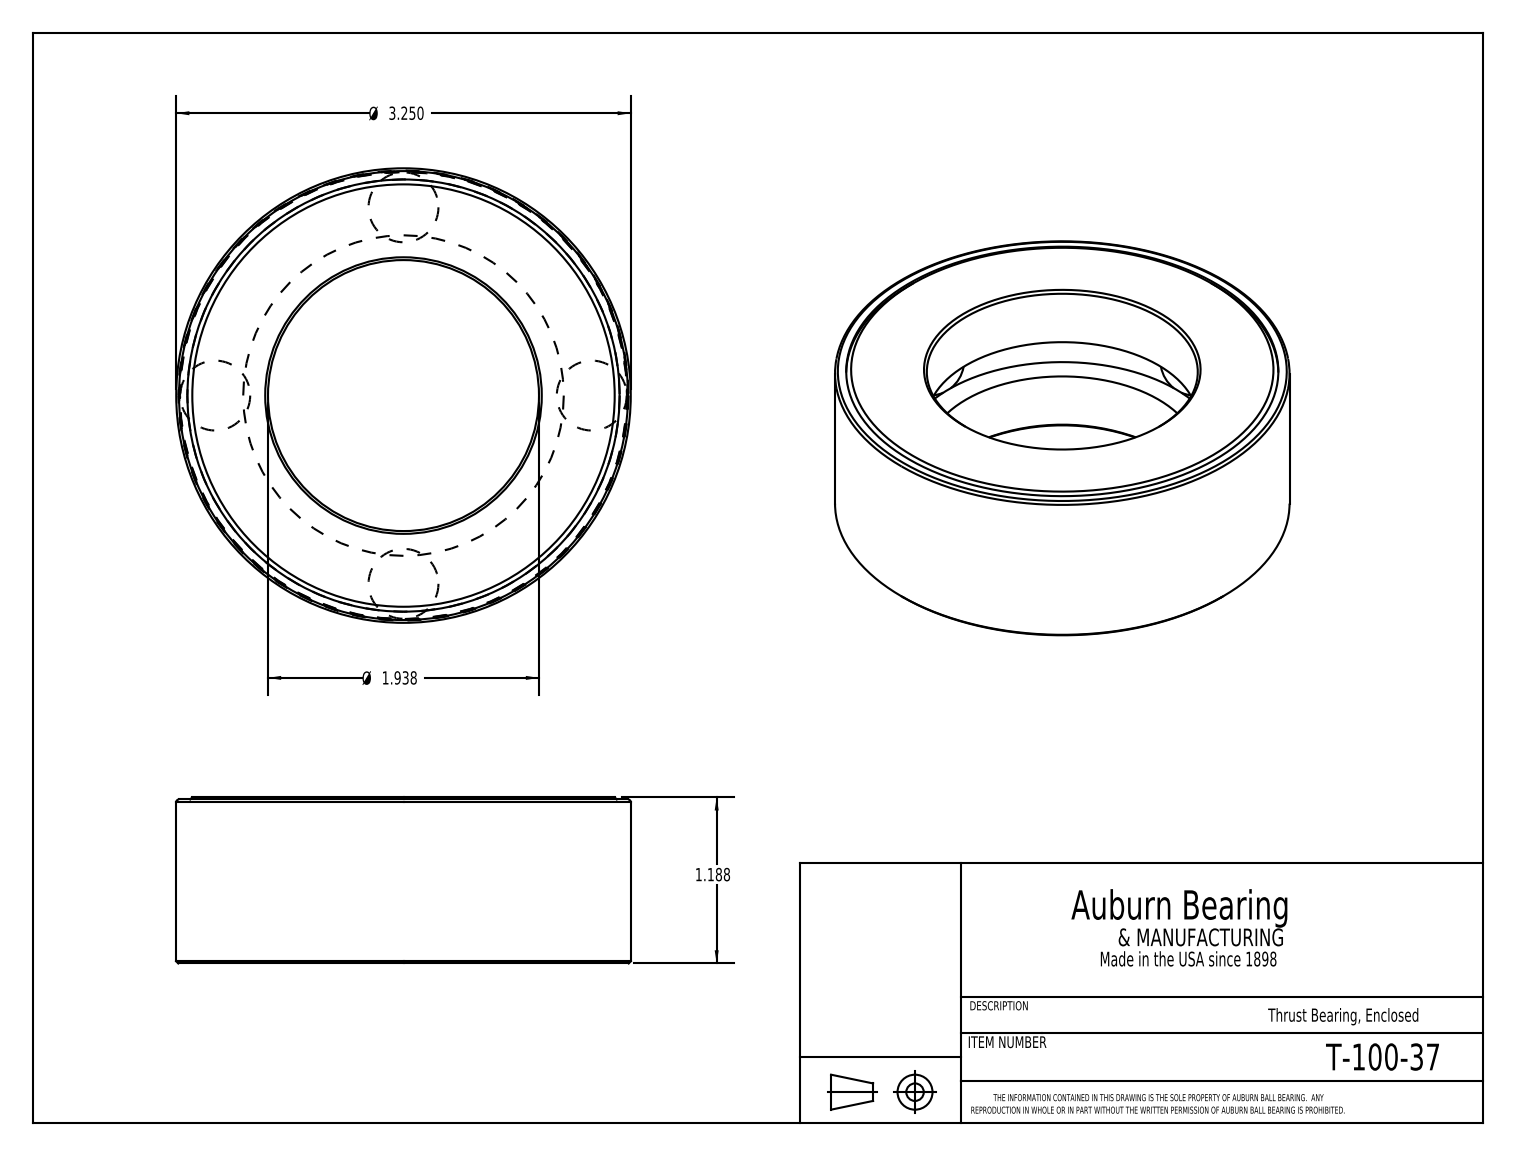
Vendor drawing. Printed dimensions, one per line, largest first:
Ø 3.250
Ø 1.938
1.188
